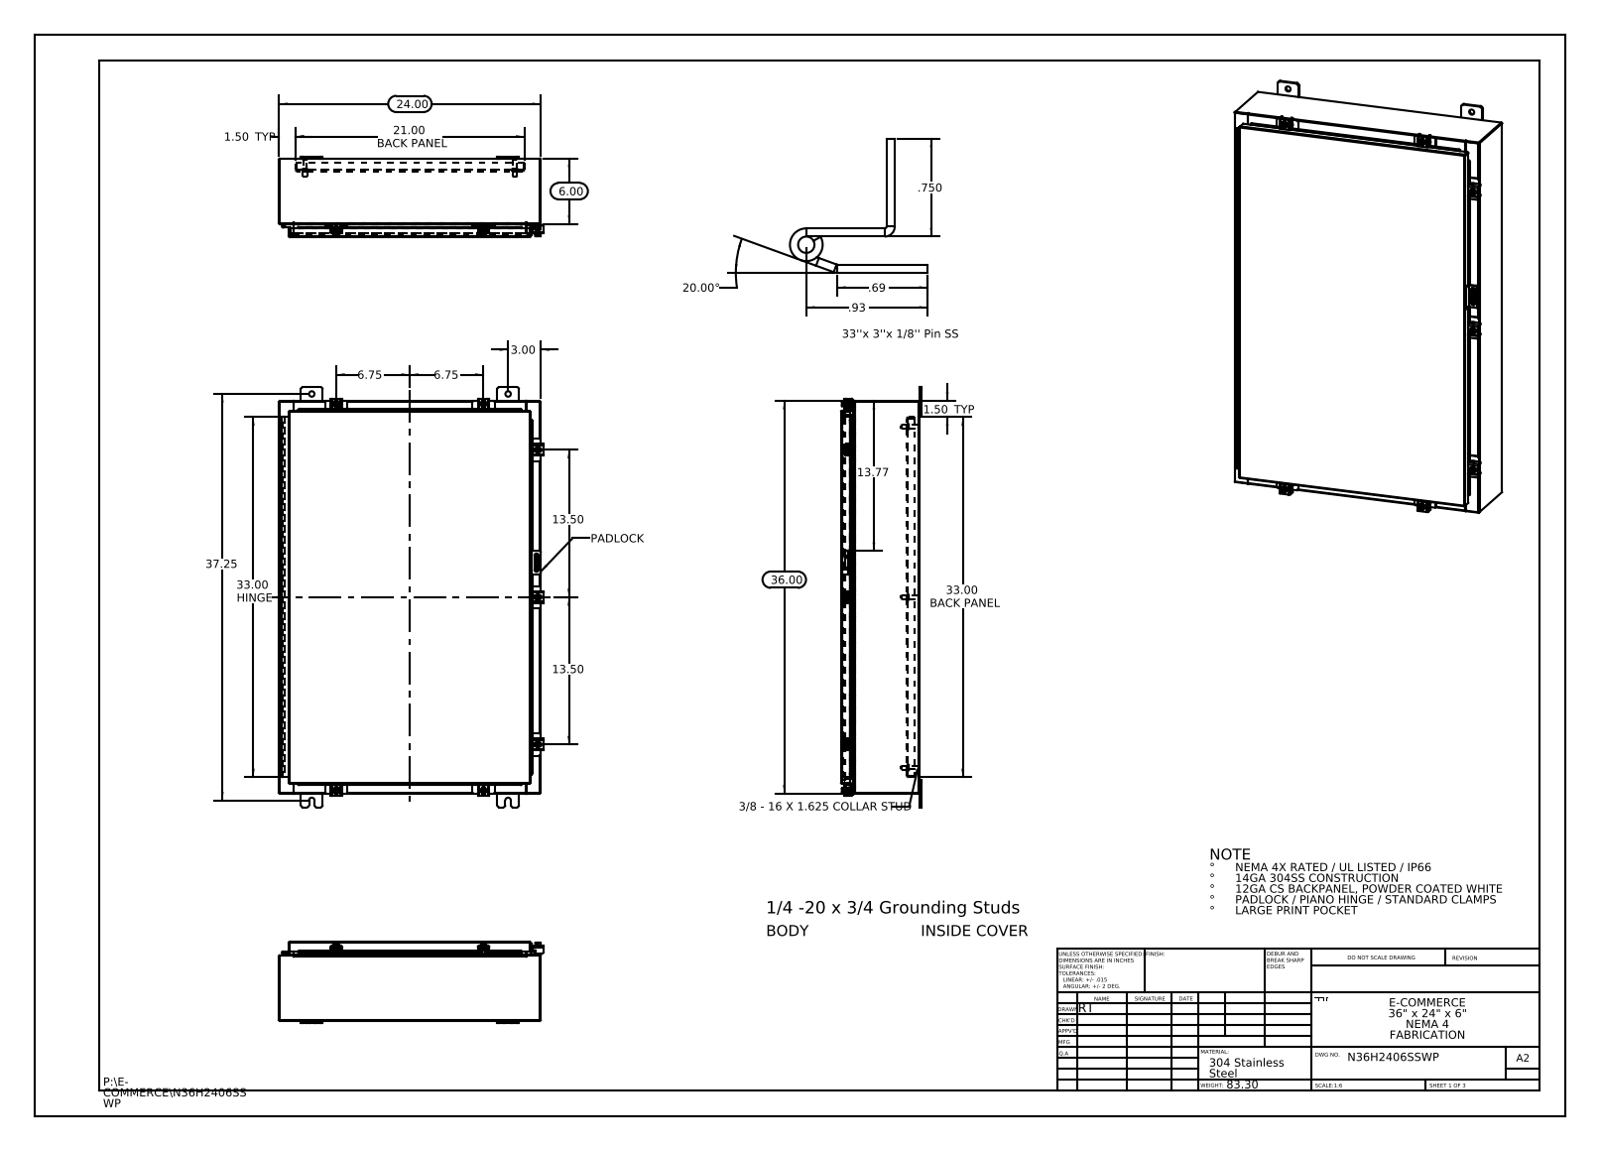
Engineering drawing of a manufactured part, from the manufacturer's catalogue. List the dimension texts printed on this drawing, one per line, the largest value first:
37.25
36.00
33.00 HINGE
33.00 BACK PANEL
24.00
21.00 BACK PANEL
20.00°
13.77
13.50
13.50
6.75
6.75
6.00
3.00
1.50 TYP
1.50 TYP
.93
.750
.69
